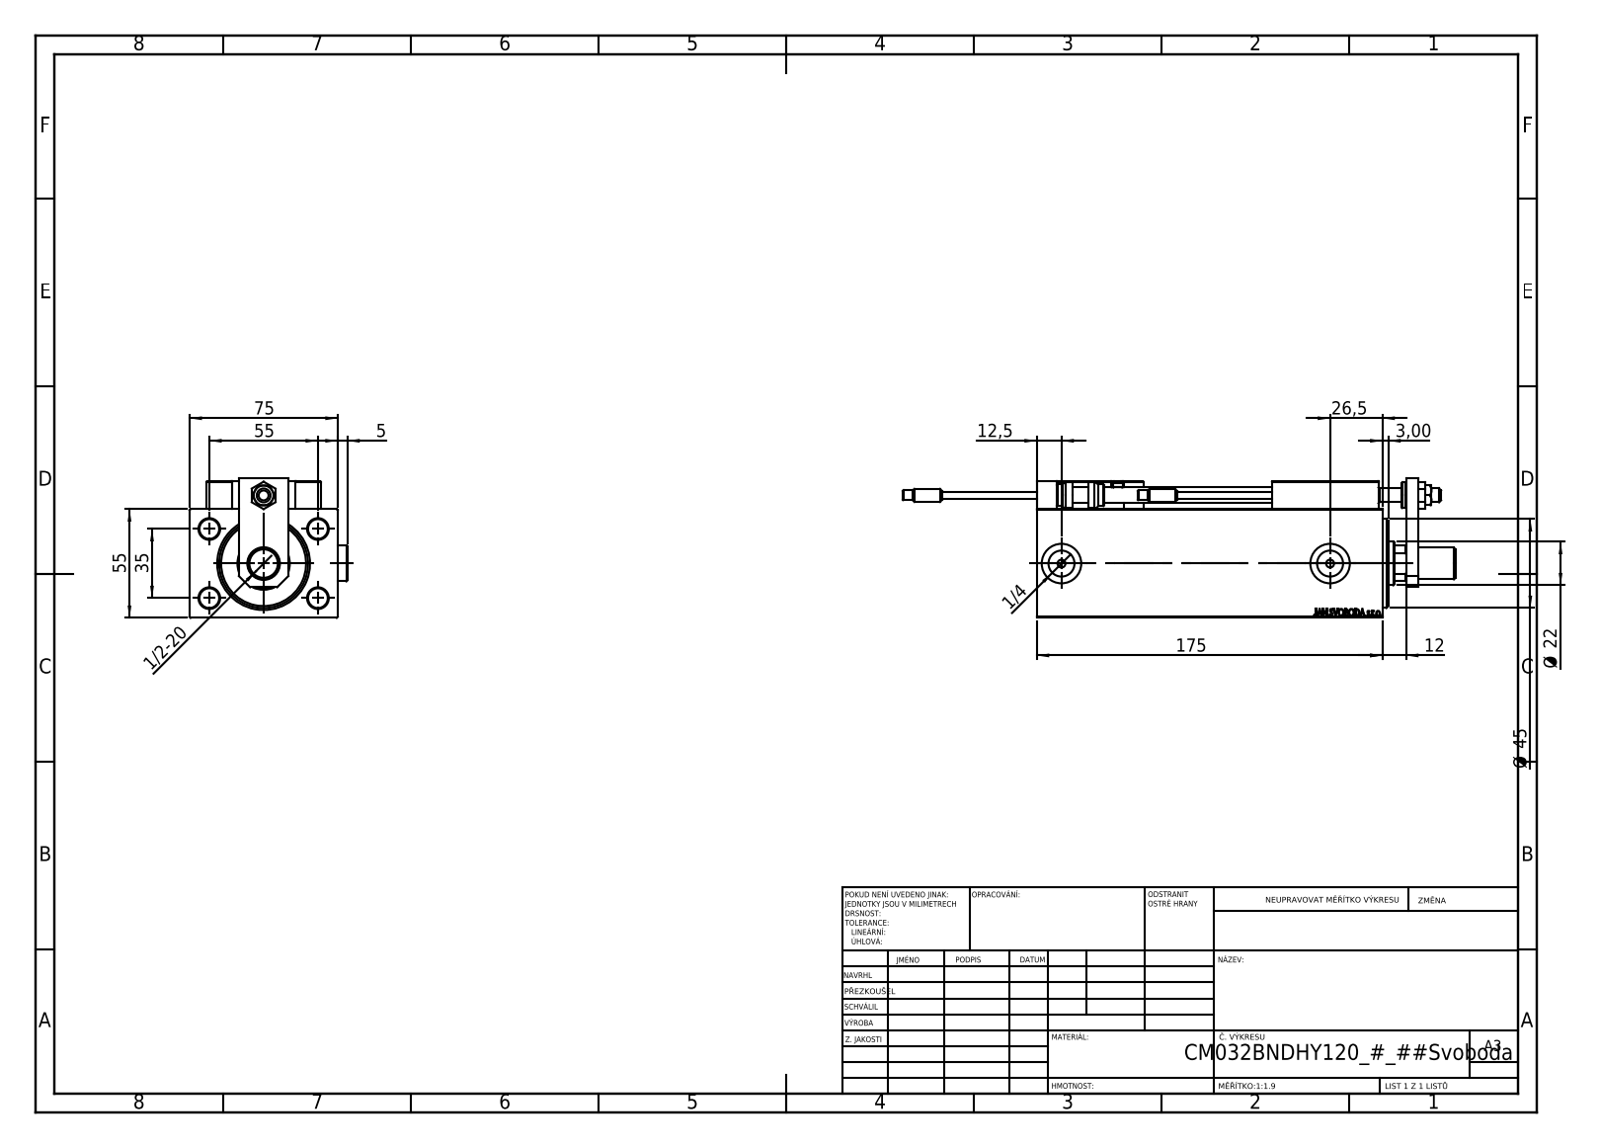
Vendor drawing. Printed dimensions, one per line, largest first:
175
75
55
55
Ø 45
35
26,5
Ø 22
12,5
12
5
3,00
1/2-20
1/4
